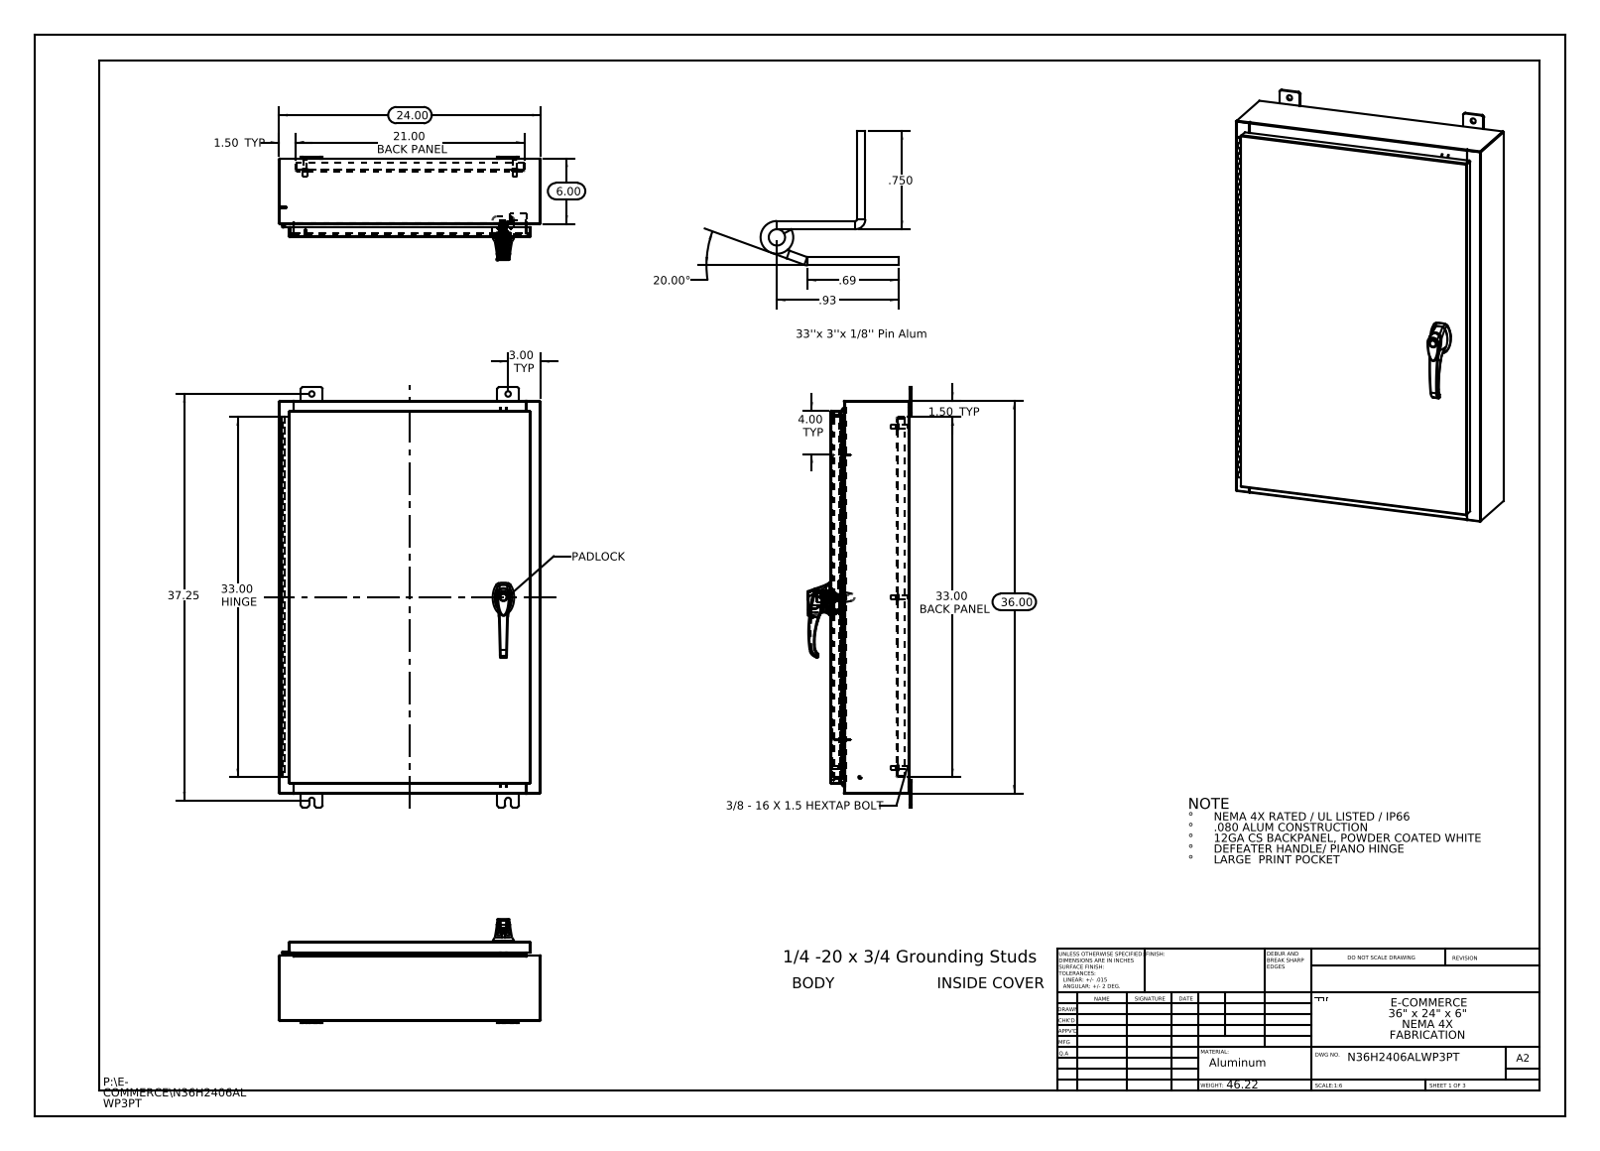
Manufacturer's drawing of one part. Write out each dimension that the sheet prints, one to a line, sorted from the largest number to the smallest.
37.25
36.00
33.00 HINGE
33.00 BACK PANEL
24.00
21.00 BACK PANEL
20.00°
6.00
4.00 TYP
3.00 TYP
1.50 TYP
1.50 TYP
.93
.750
.69
